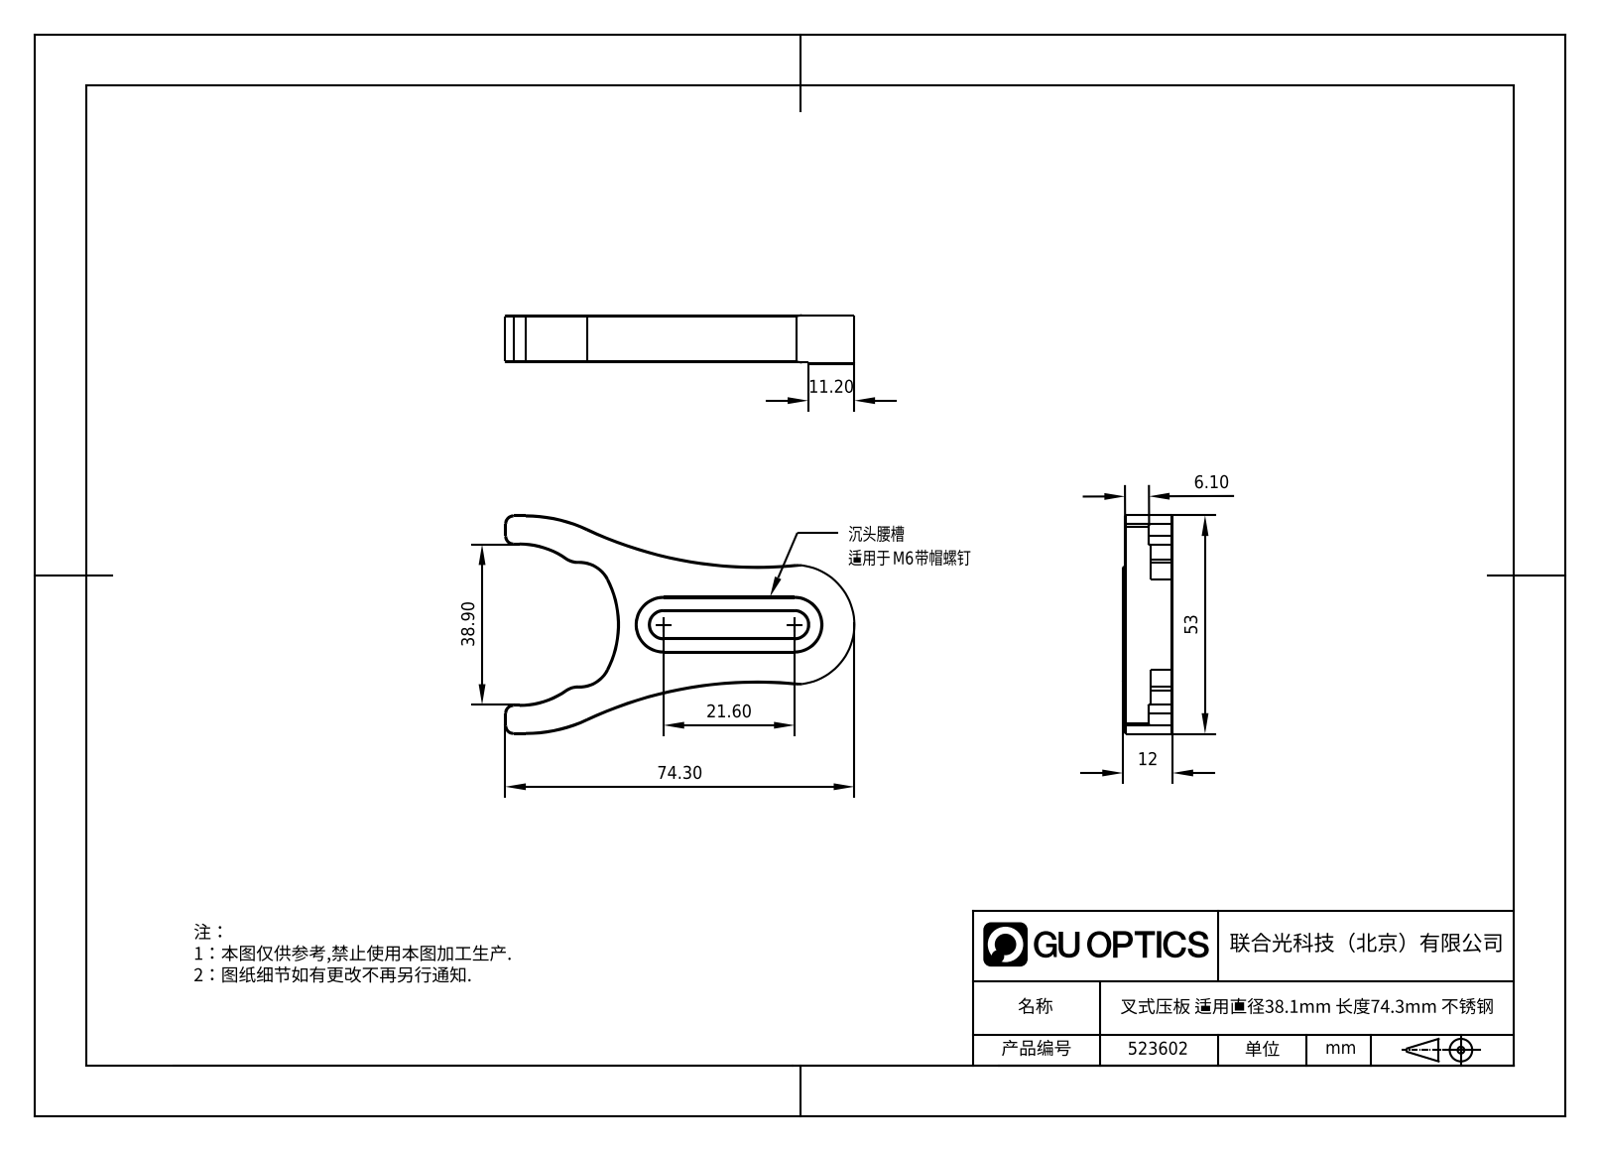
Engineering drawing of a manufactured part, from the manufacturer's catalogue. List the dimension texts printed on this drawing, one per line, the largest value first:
74.30
53
38.90
21.60
12
11.20
6.10
